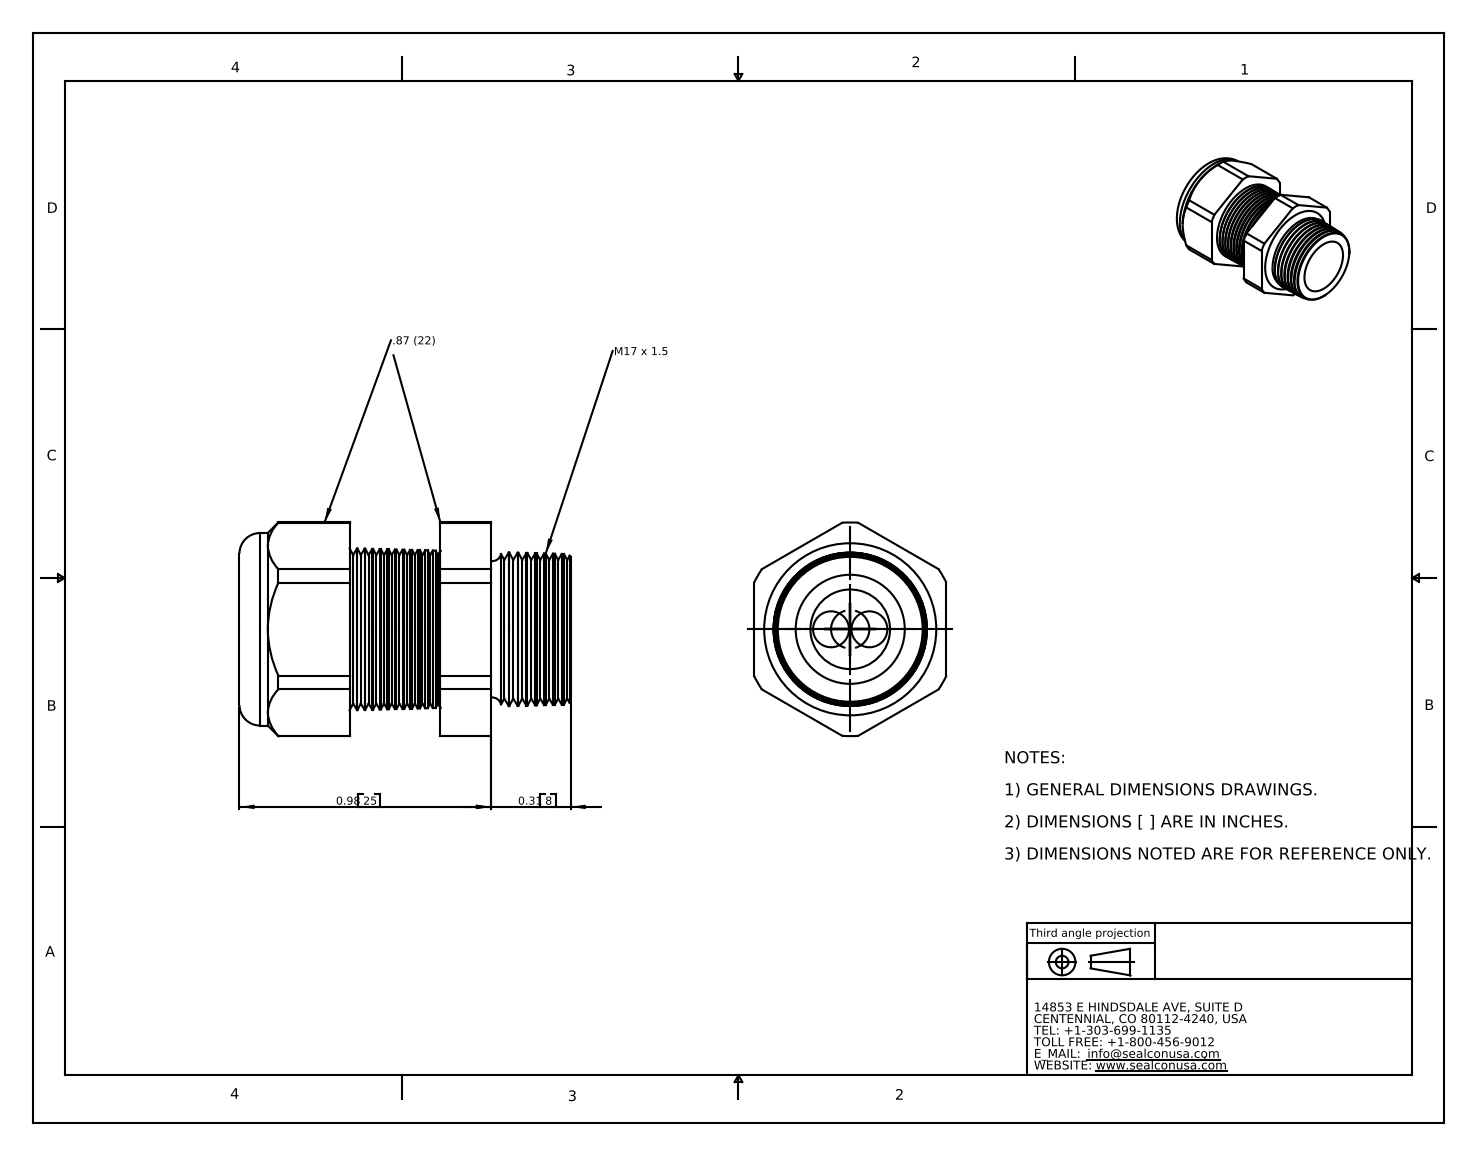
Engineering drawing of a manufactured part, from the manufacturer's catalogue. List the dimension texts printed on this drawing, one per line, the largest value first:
0.98 25
0.31 8
